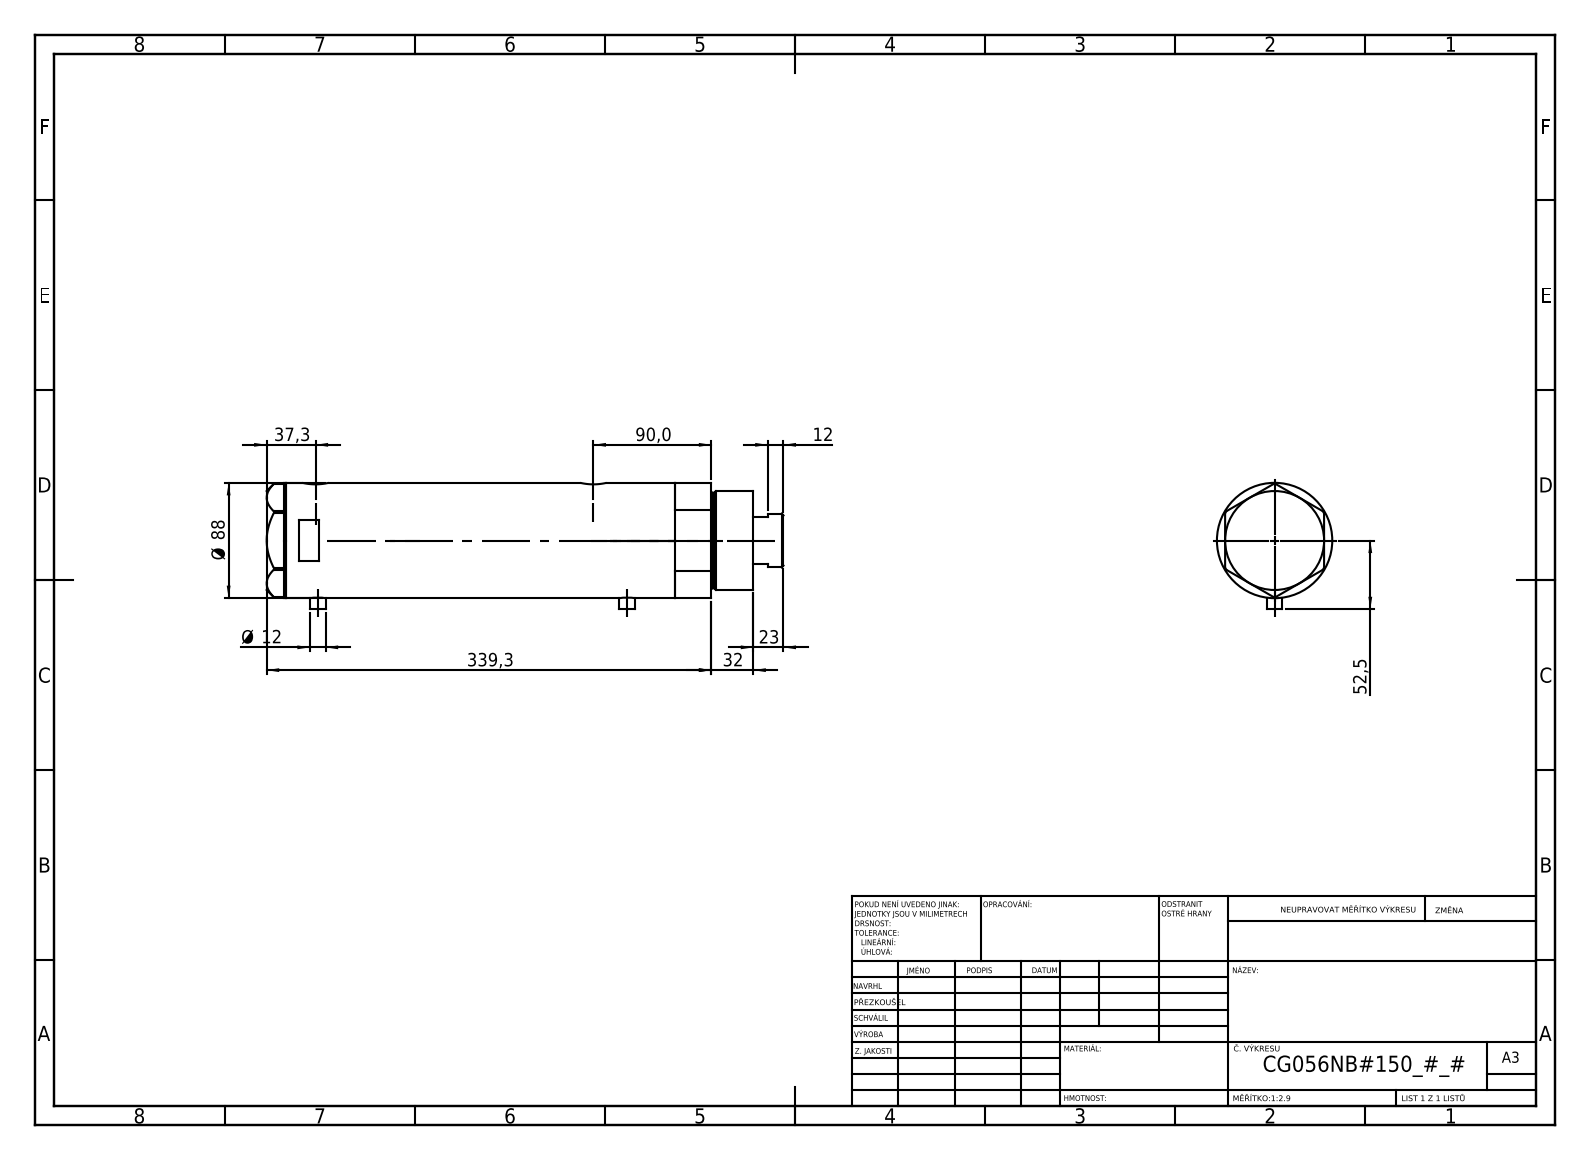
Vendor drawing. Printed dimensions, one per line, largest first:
339,3
90,0
Ø 88
52,5
37,3
32
23
12
Ø 12
